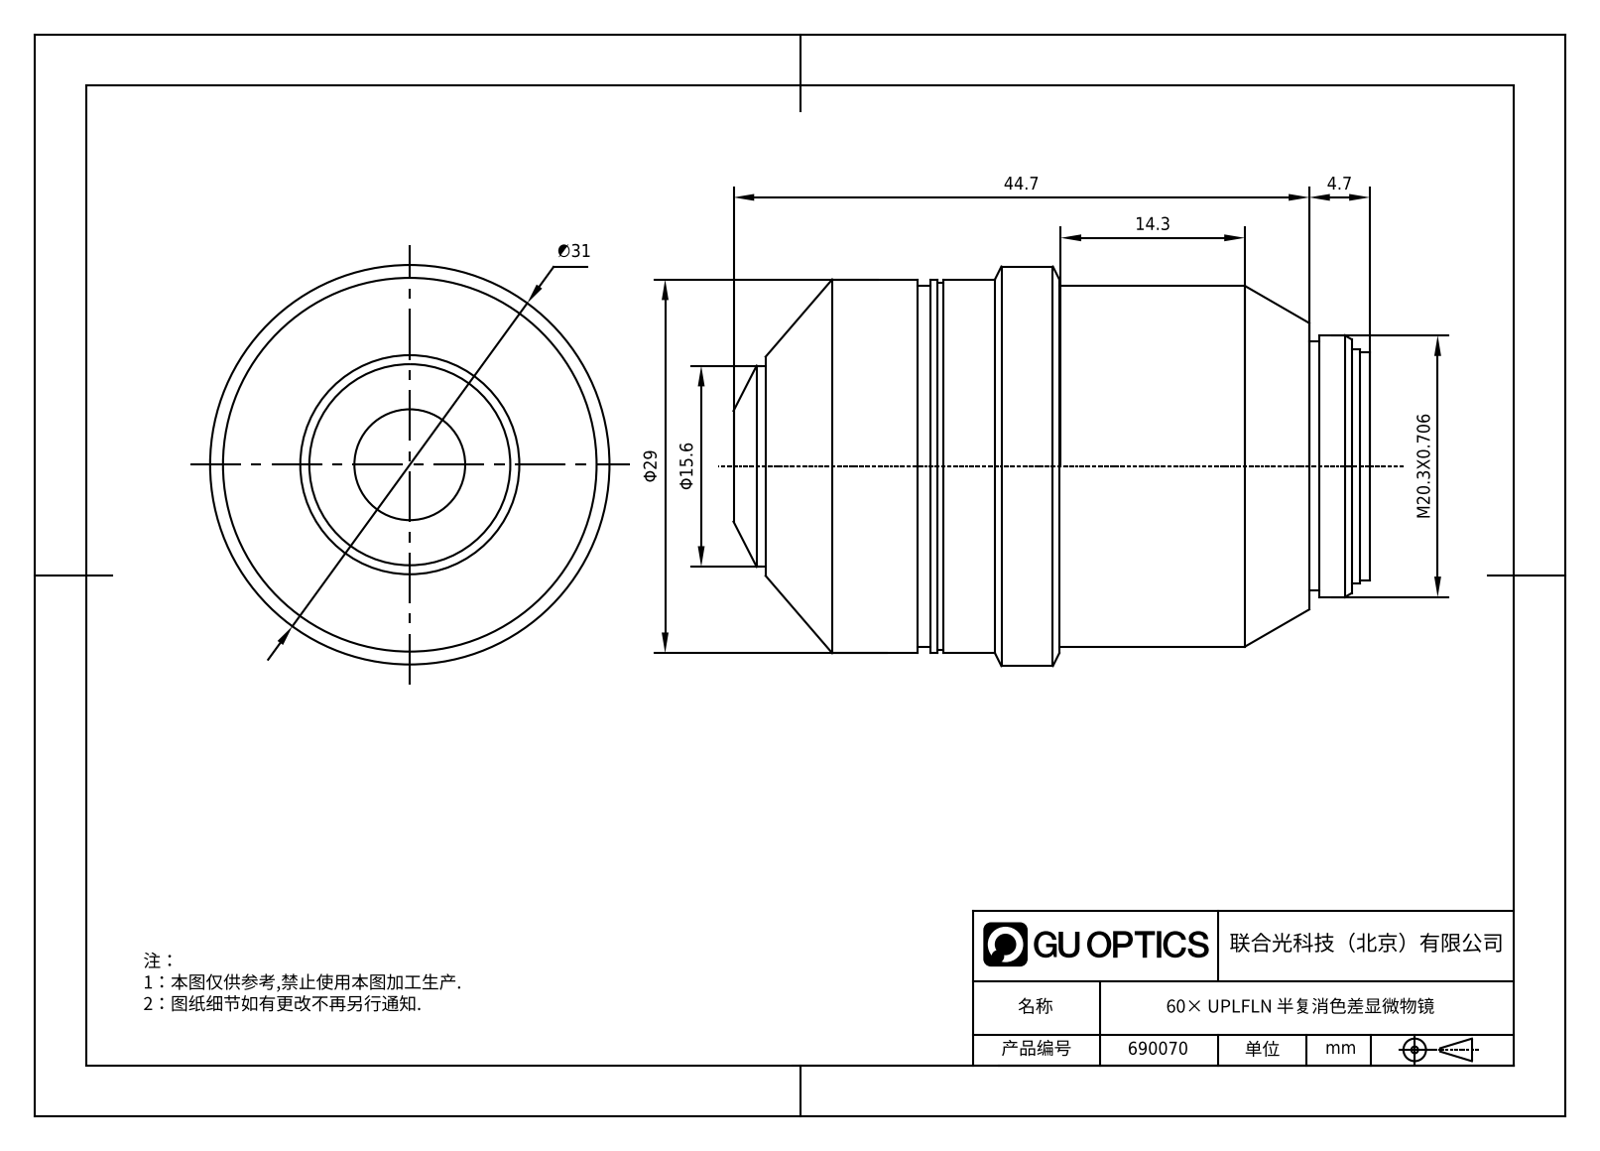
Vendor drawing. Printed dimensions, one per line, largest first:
44.7
∅31
Φ29
M20.3X0.706
Φ15.6
14.3
4.7
